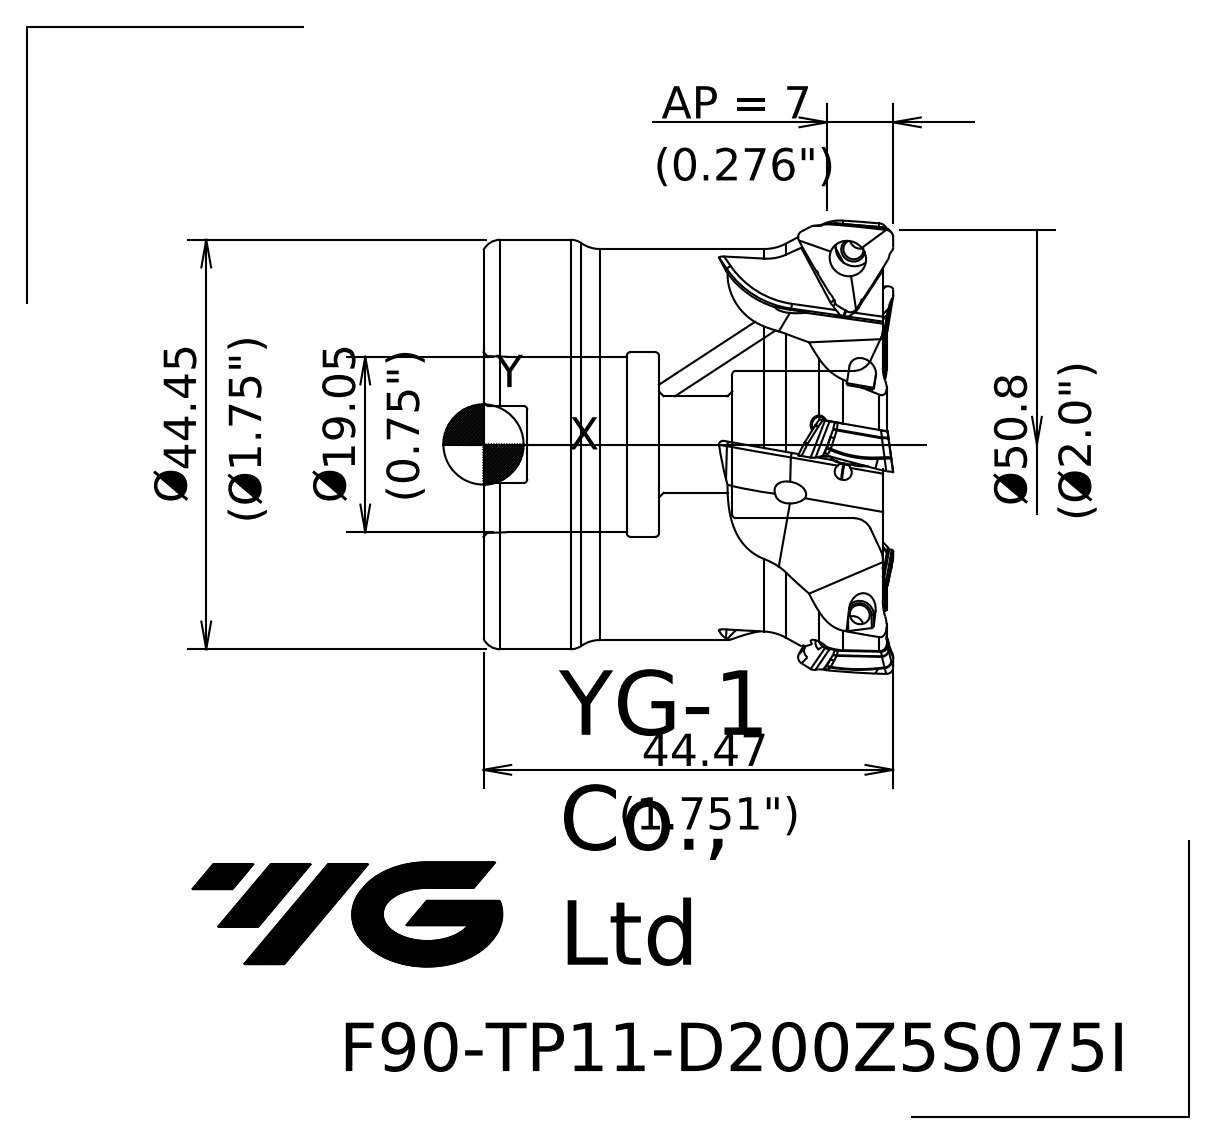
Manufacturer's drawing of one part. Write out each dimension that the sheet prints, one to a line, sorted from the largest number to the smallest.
44.47
Ø 44.45
Ø 19.05
AP = 7
